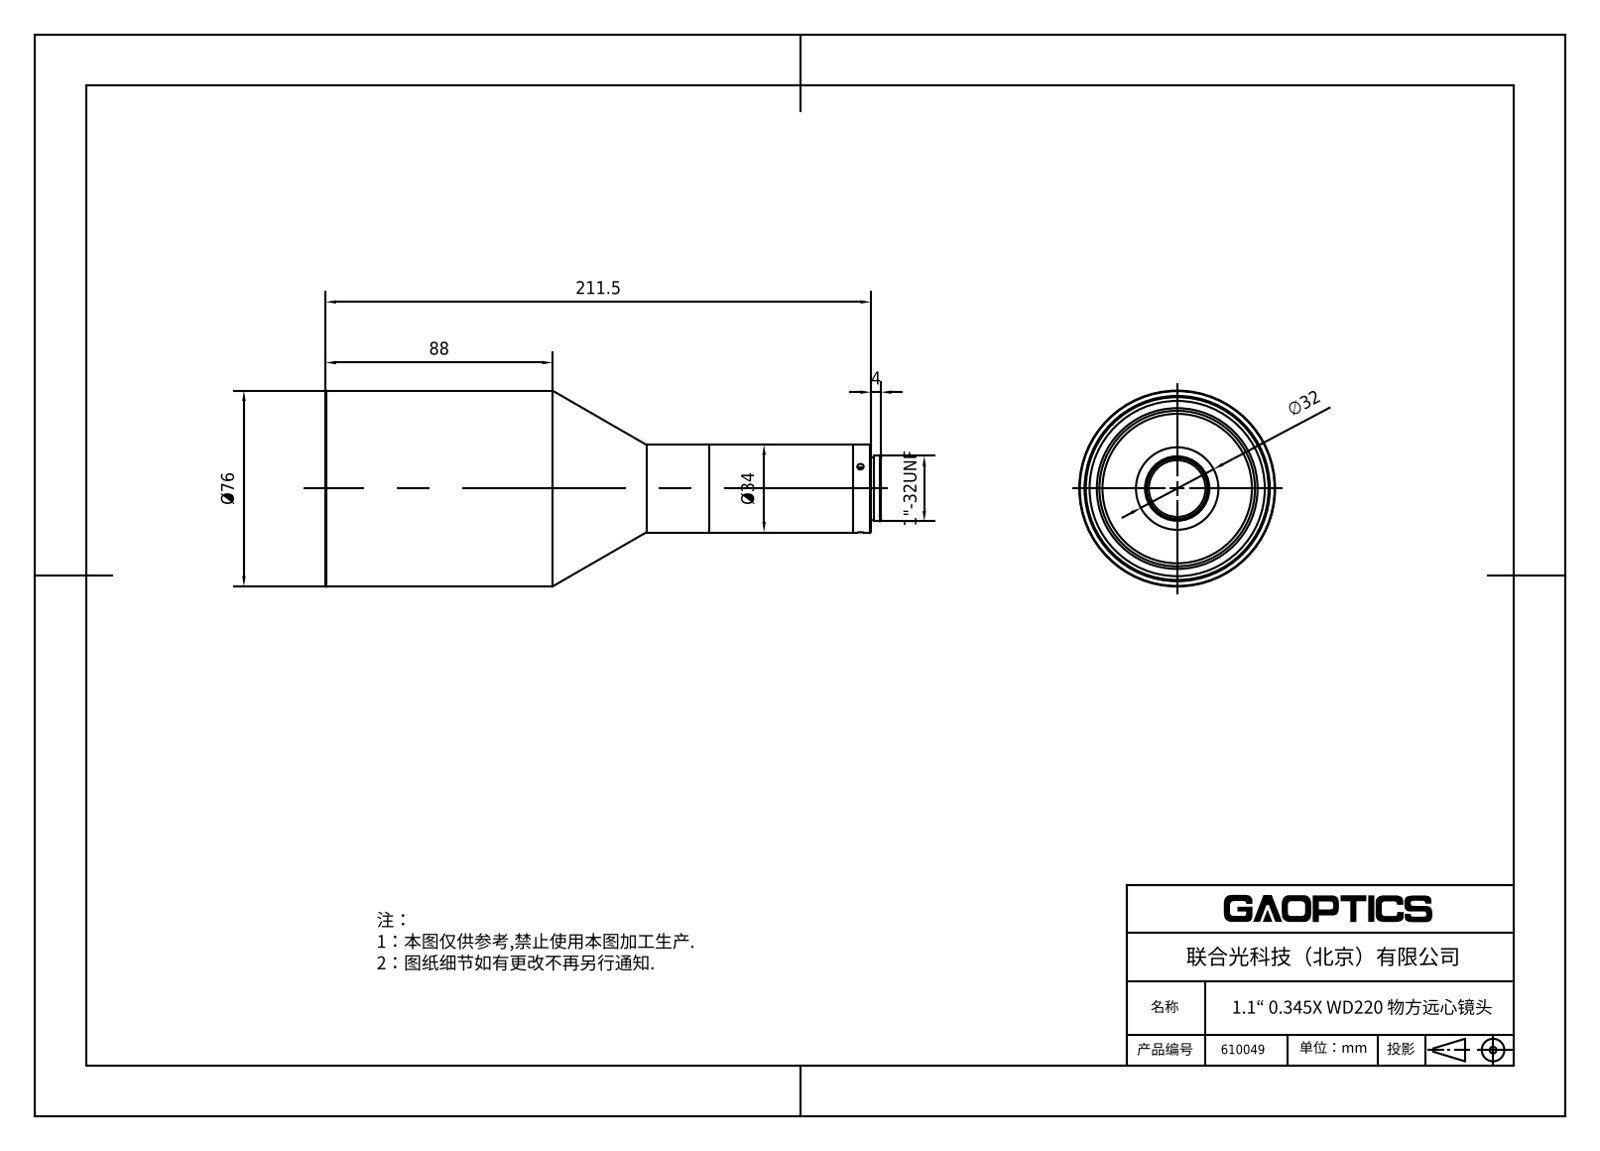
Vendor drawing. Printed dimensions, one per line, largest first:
211.5
88
Ø76
Ø34
∅32
4
1"-32UNF
